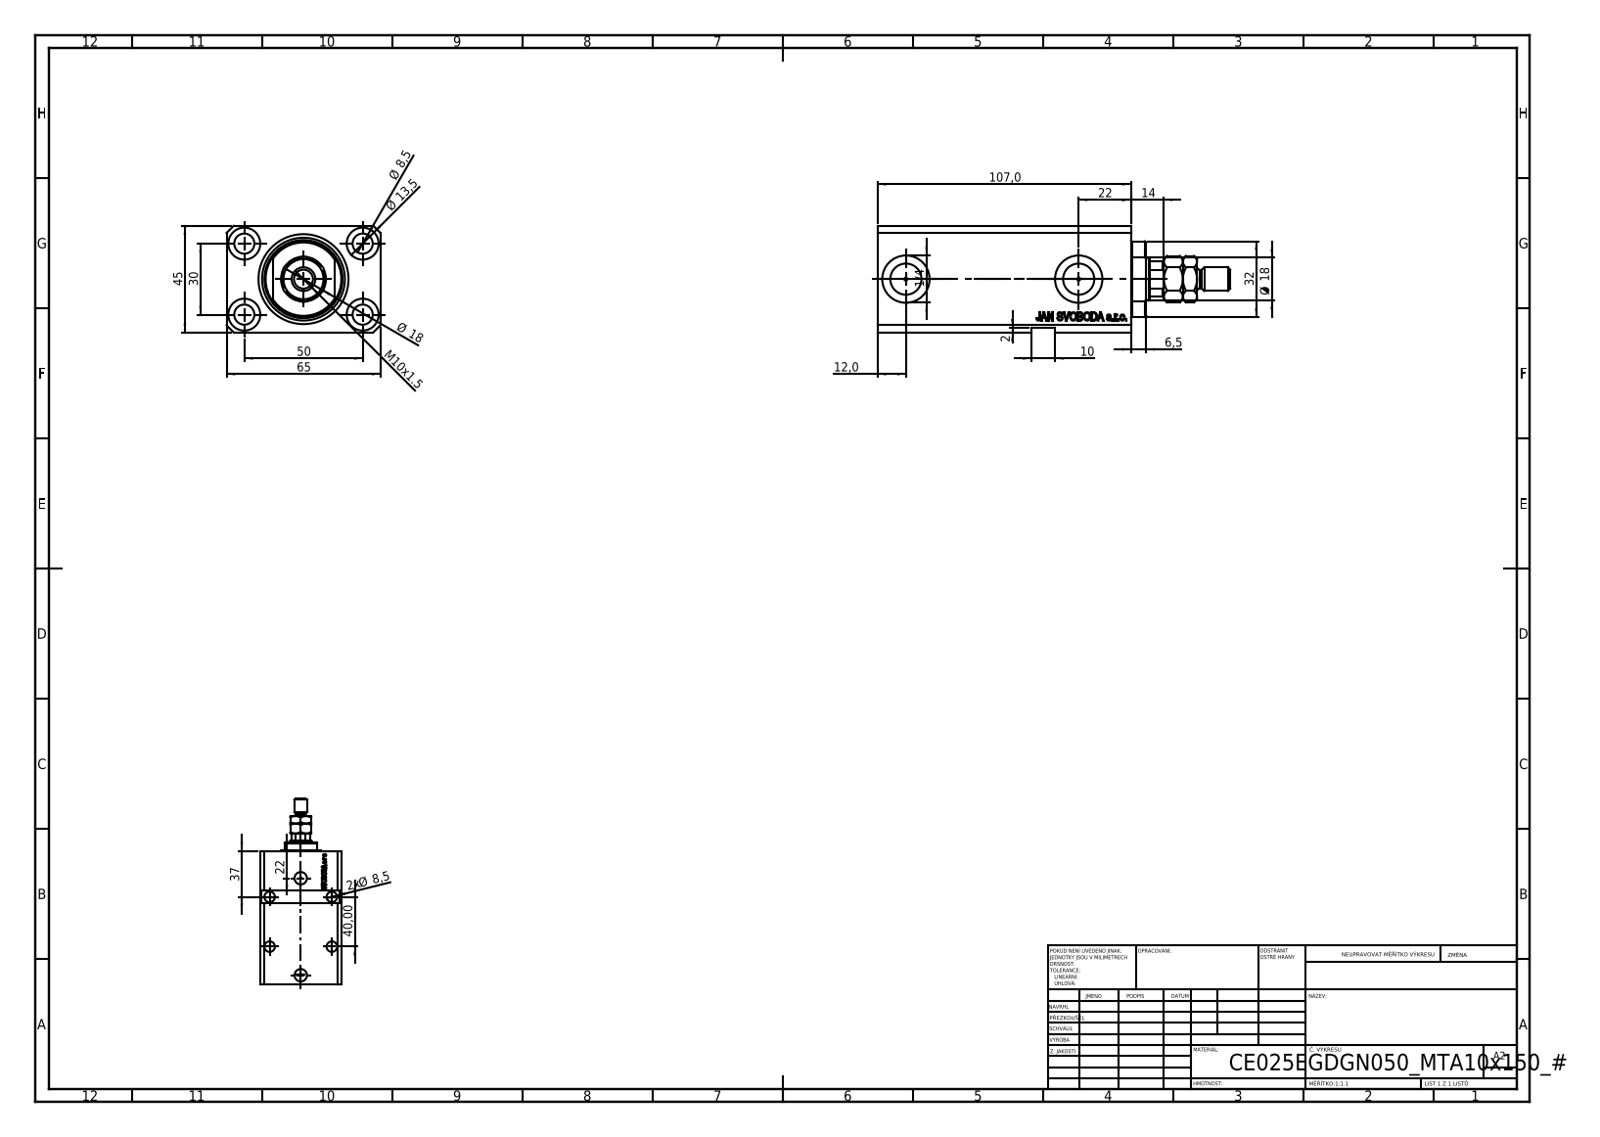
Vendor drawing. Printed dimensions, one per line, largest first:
107,0
65
50
45
40,00
37
32
30
22
22
Ø 18
Ø 18
14
Ø 13,5
12,0
M10x1.5
10
Ø 8,5
2x Ø 8,5
6,5
2
1/4
